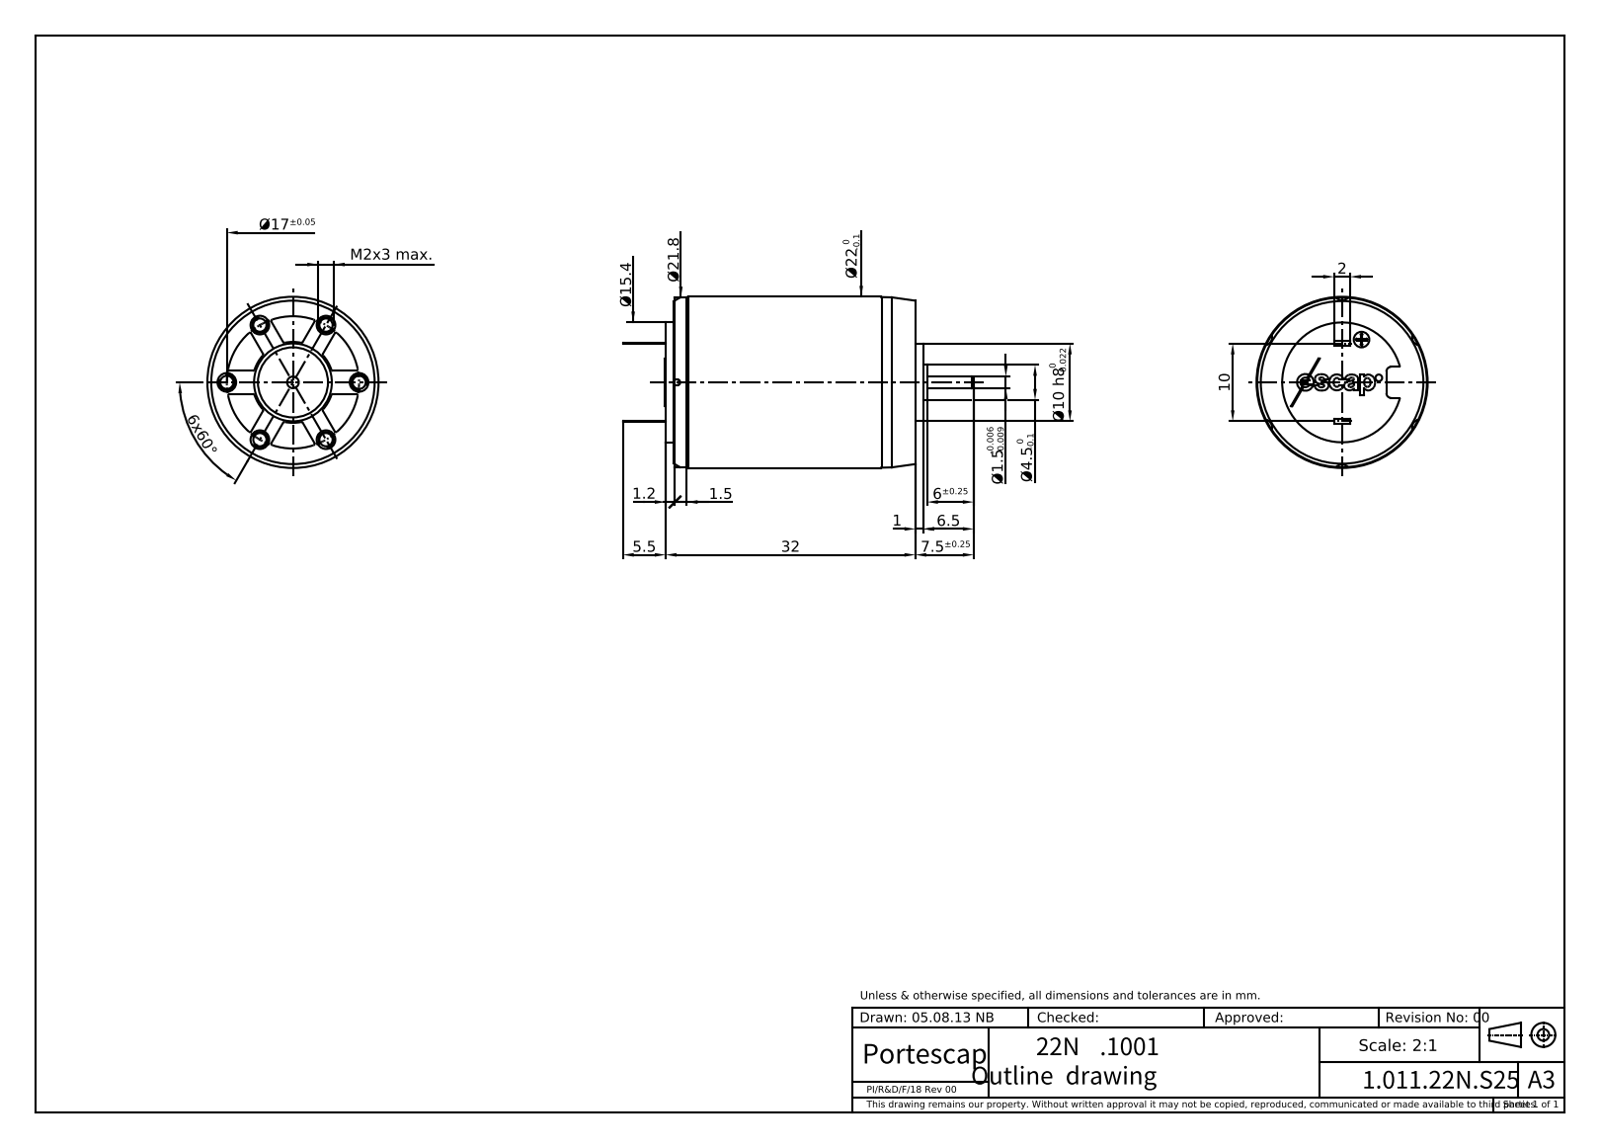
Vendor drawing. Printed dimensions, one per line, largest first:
6x60°
32
Ø10 h8
10
7.5±0.25
6.5
6±0.25
5.5
Ø4.5
2
Ø1.5
1.5
1.2
1
